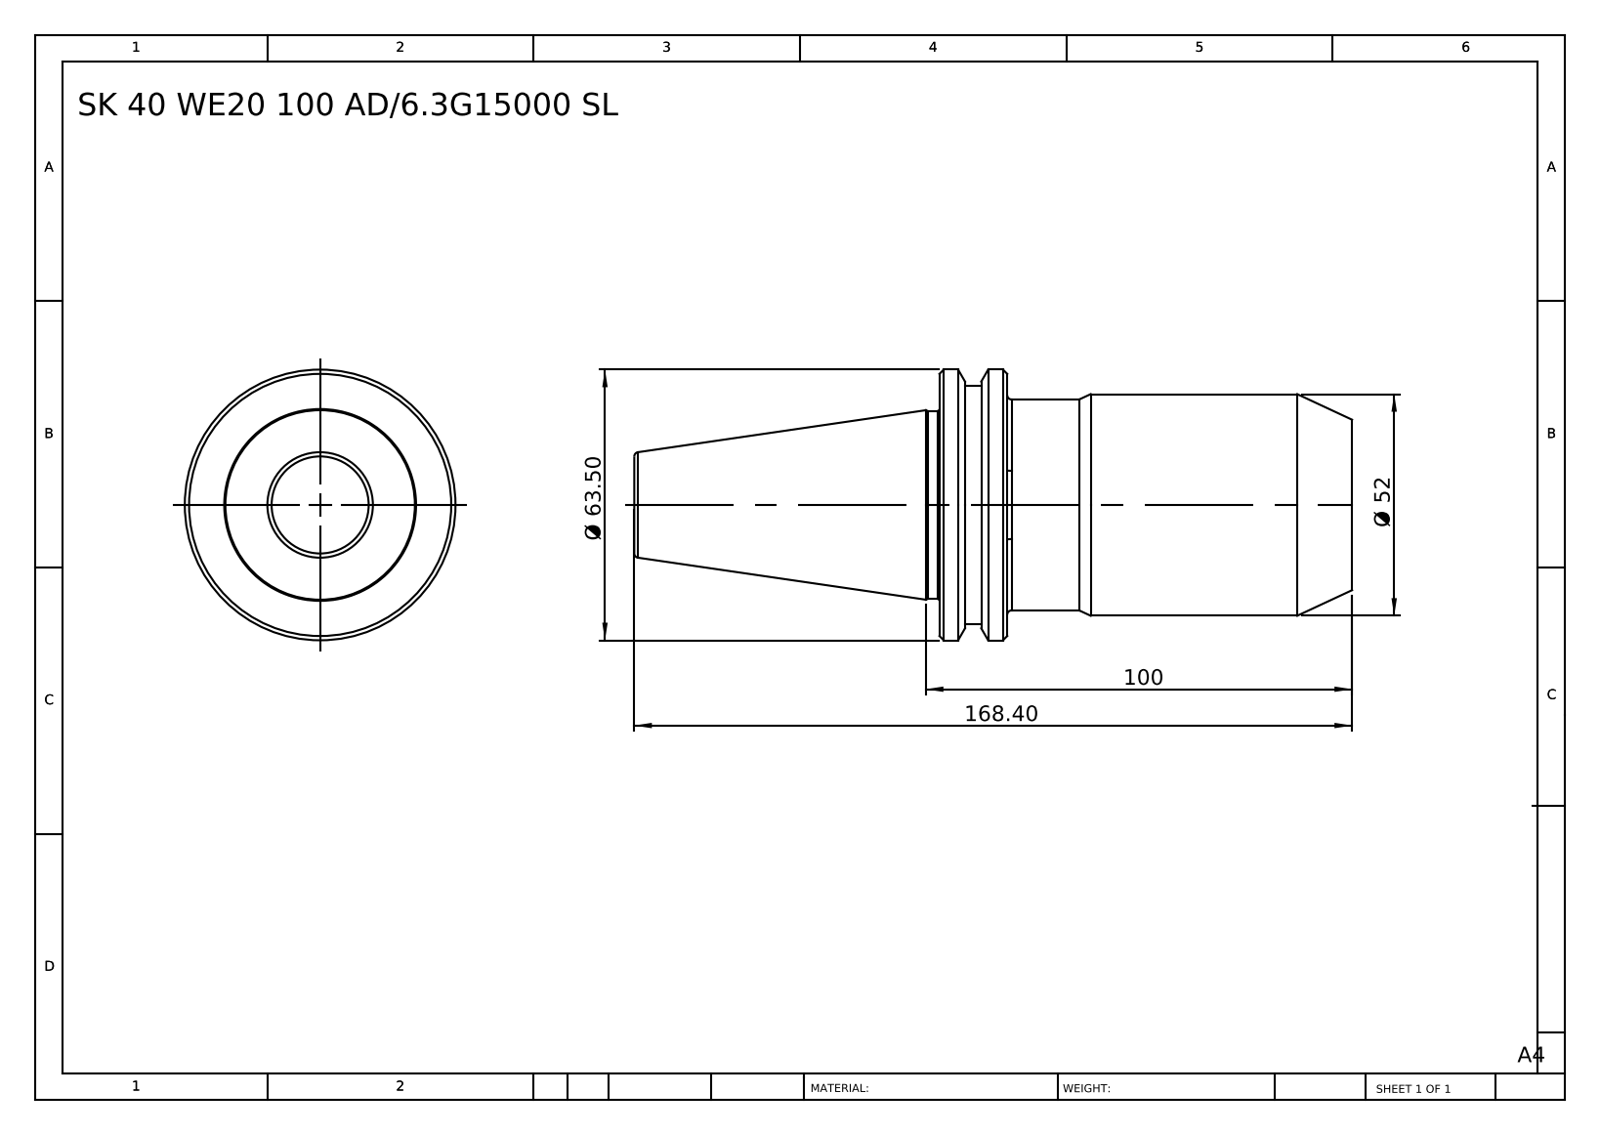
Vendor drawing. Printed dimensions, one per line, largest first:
168.40
100
Ø 63.50
Ø 52
